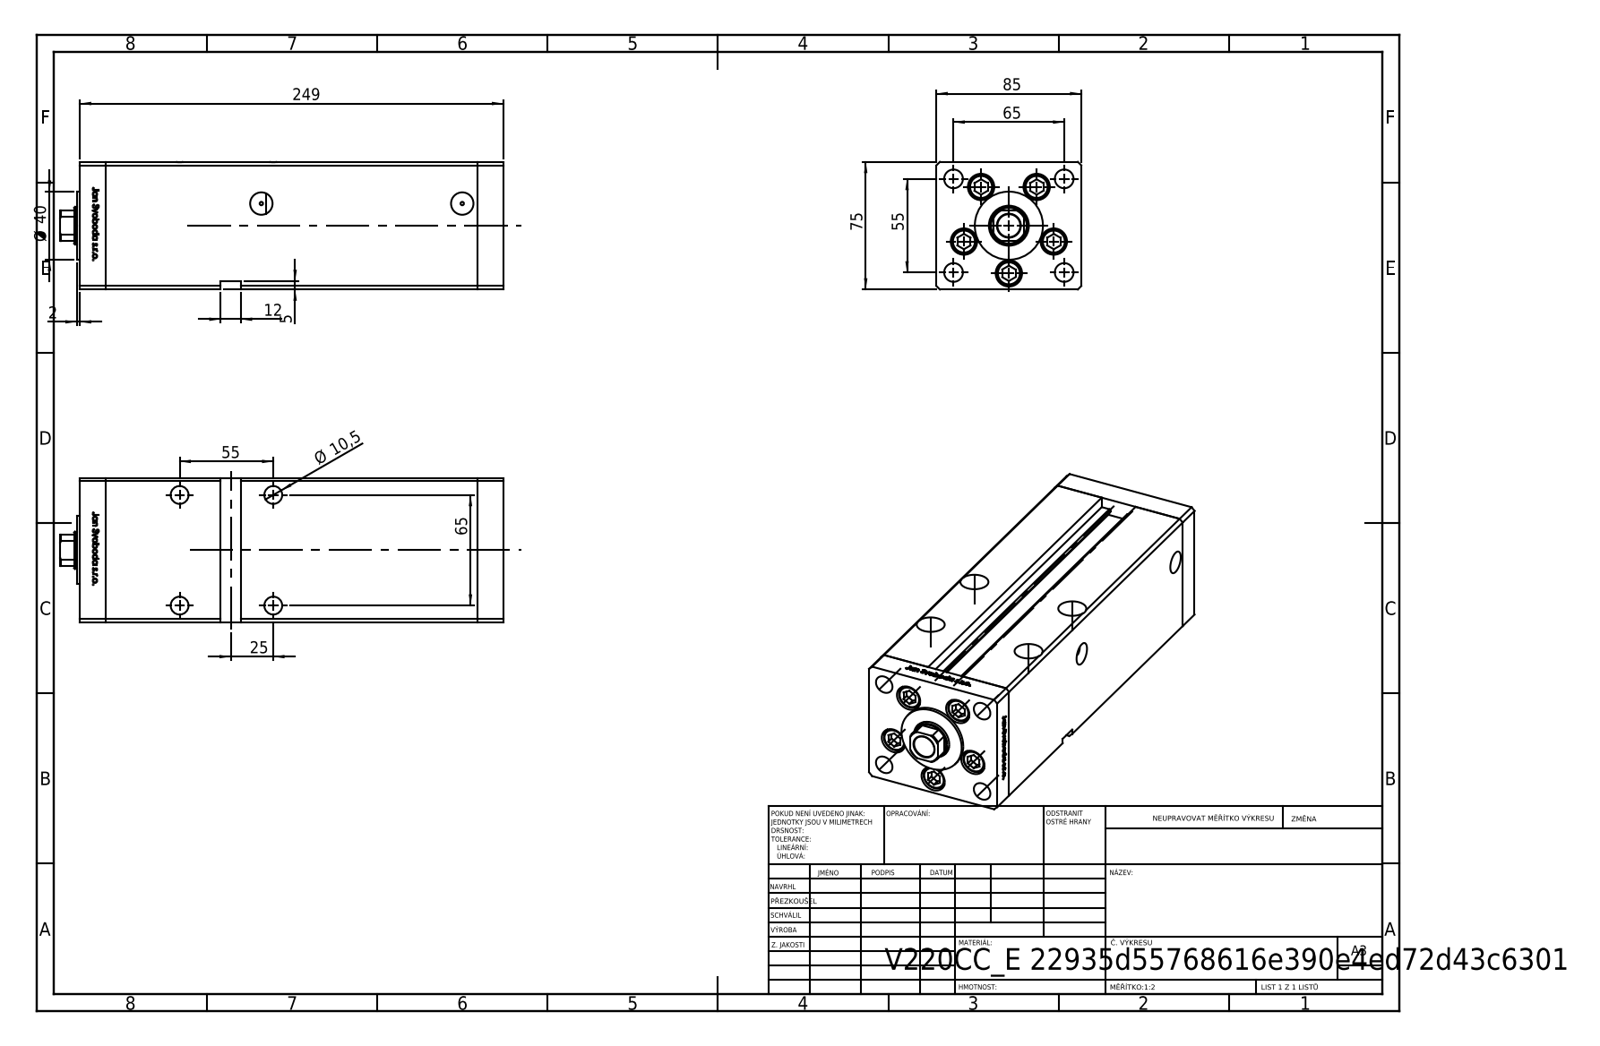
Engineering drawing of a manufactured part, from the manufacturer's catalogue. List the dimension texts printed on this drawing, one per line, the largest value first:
249
85
75
65
65
55
55
Ø 40
25
12
Ø 10,5
5
2
